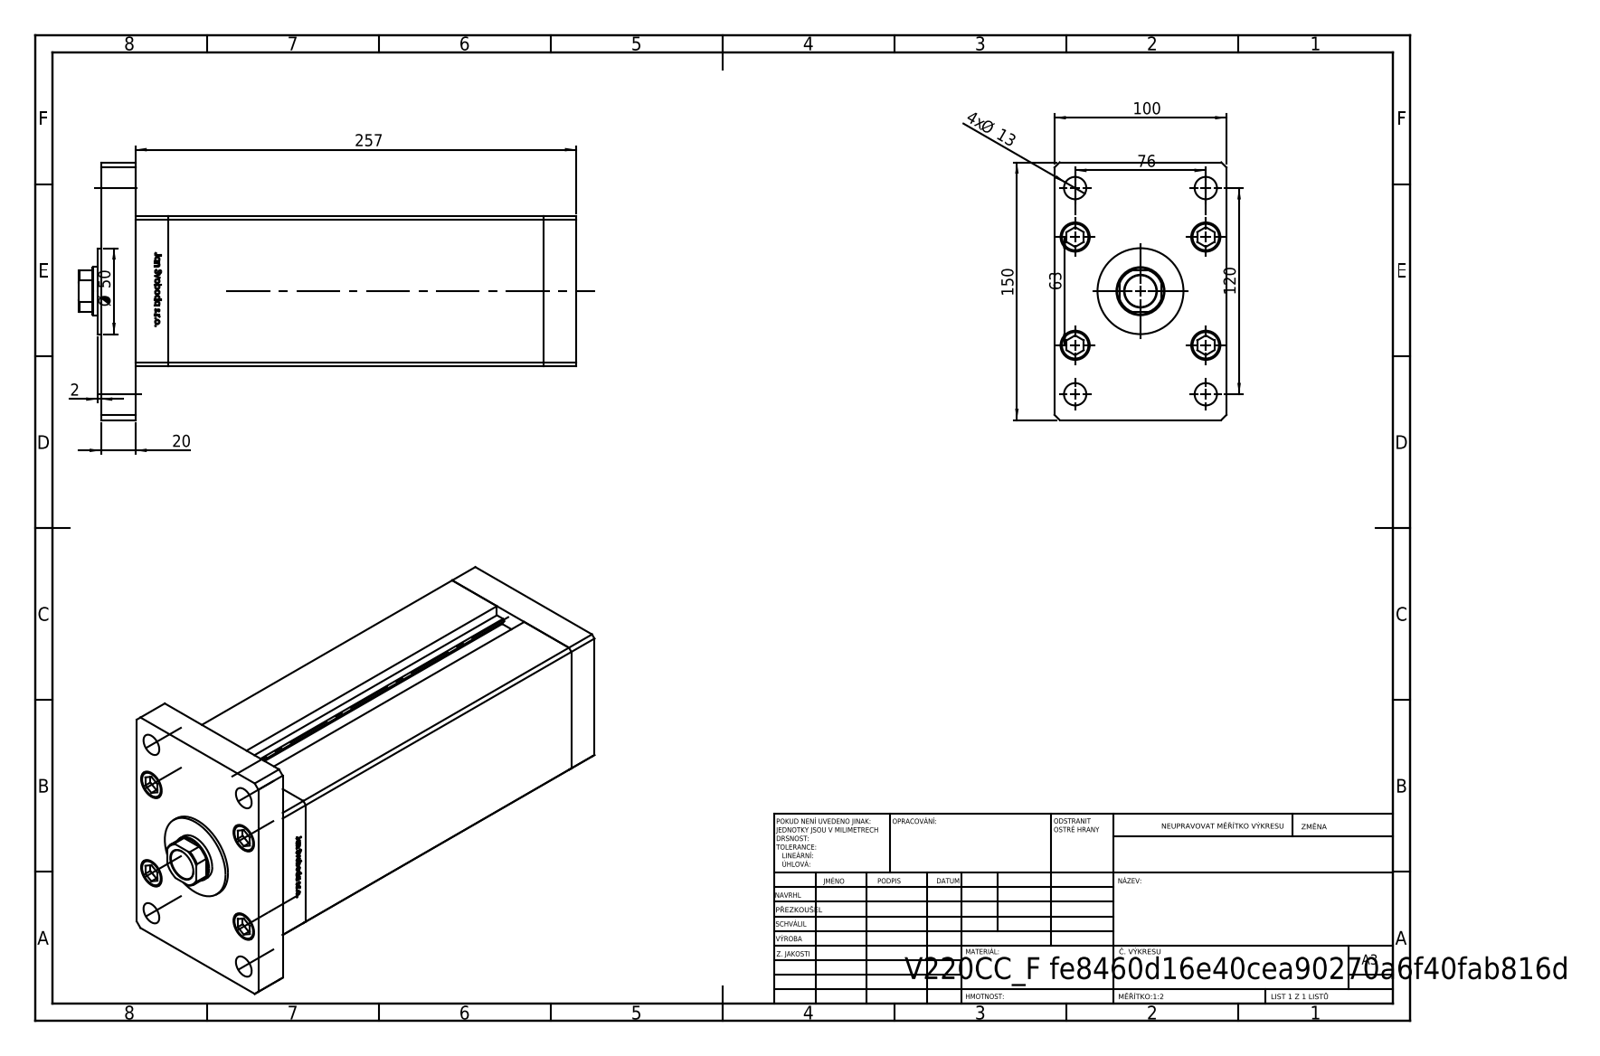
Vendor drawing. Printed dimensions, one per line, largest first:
257
150
120
100
76
63
Ø 50
20
4x Ø 13
2
